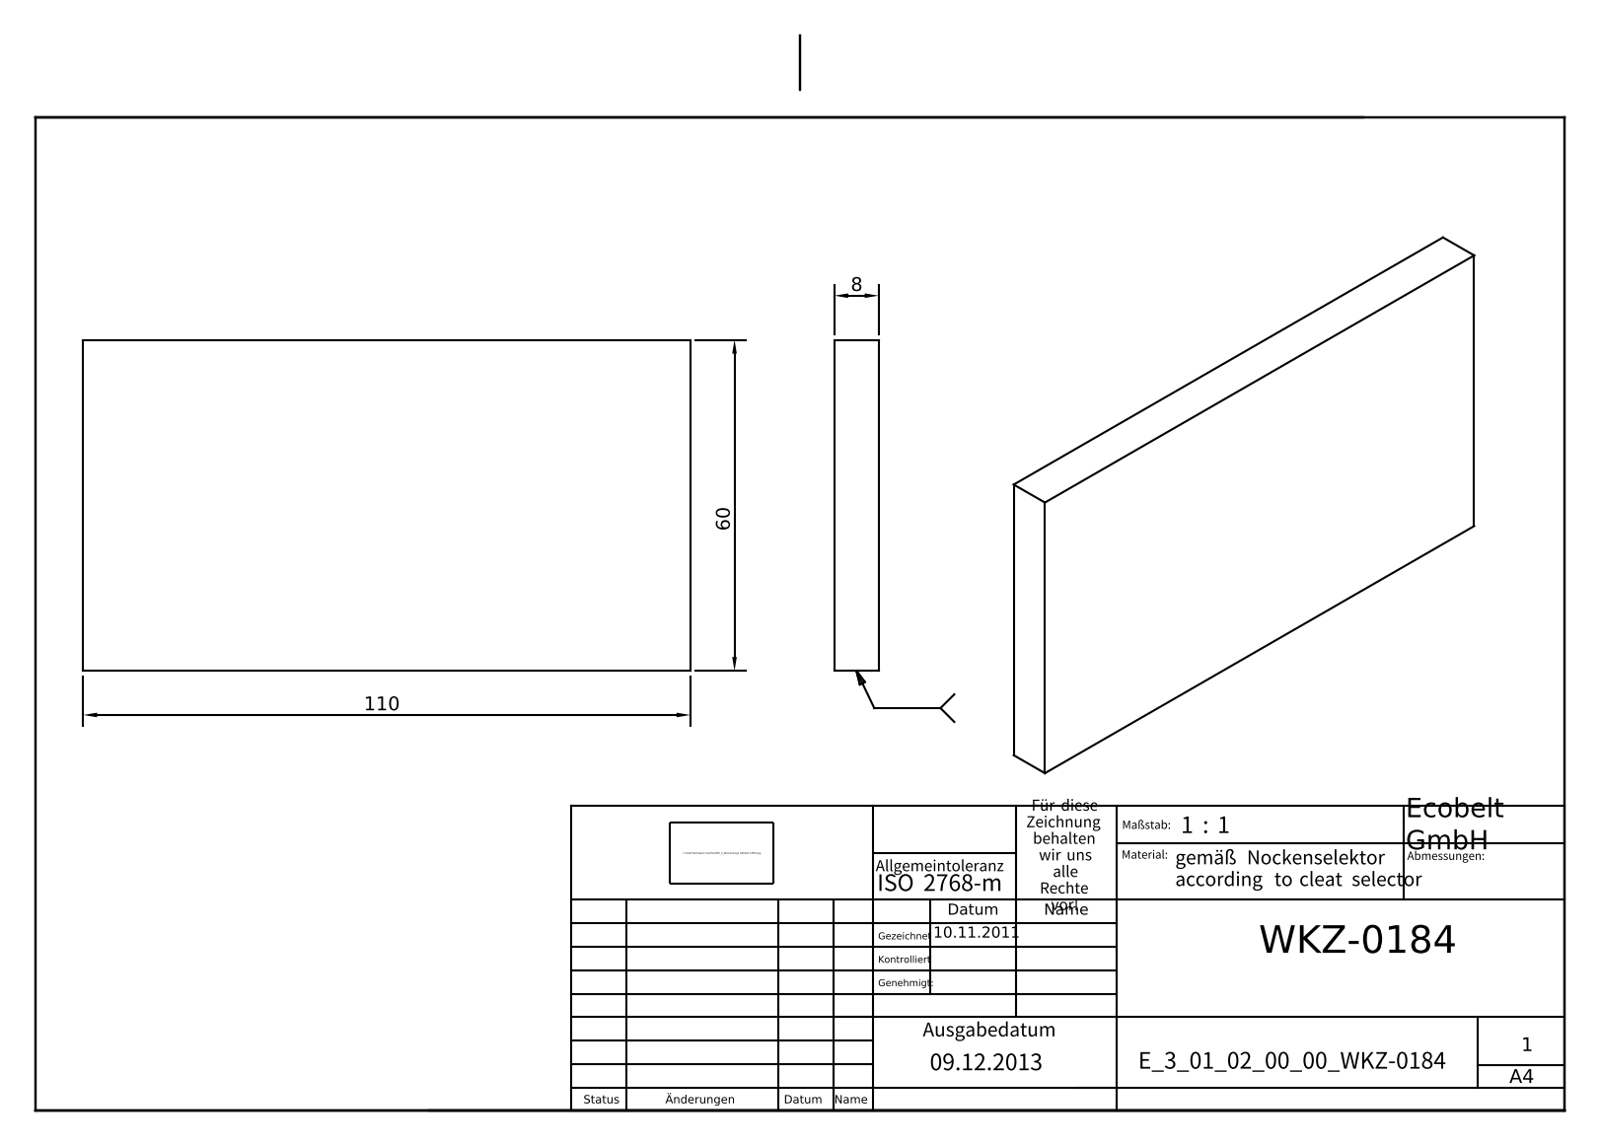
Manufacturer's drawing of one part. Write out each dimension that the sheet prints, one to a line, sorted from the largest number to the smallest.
110
60
8
